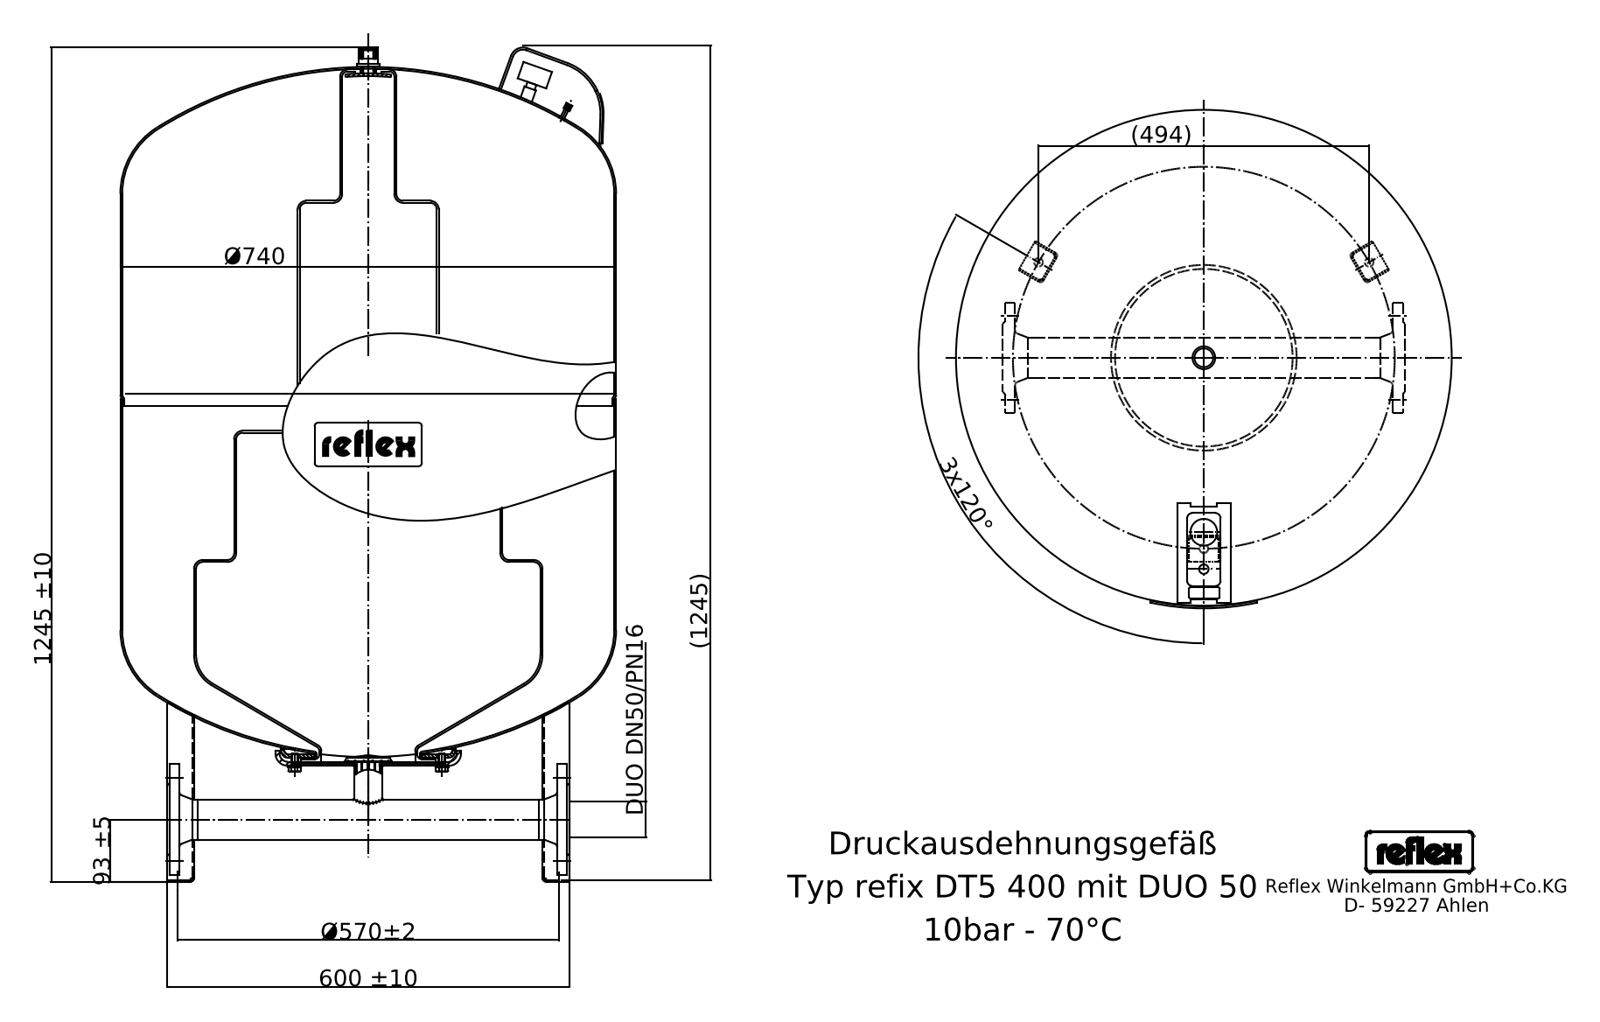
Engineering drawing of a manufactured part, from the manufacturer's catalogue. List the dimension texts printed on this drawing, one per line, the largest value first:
1245 ±10
(1245)
Ø740
600 ±10
Ø570±2
(494)
3x120°
93 ±5
DUO DN50/PN16
